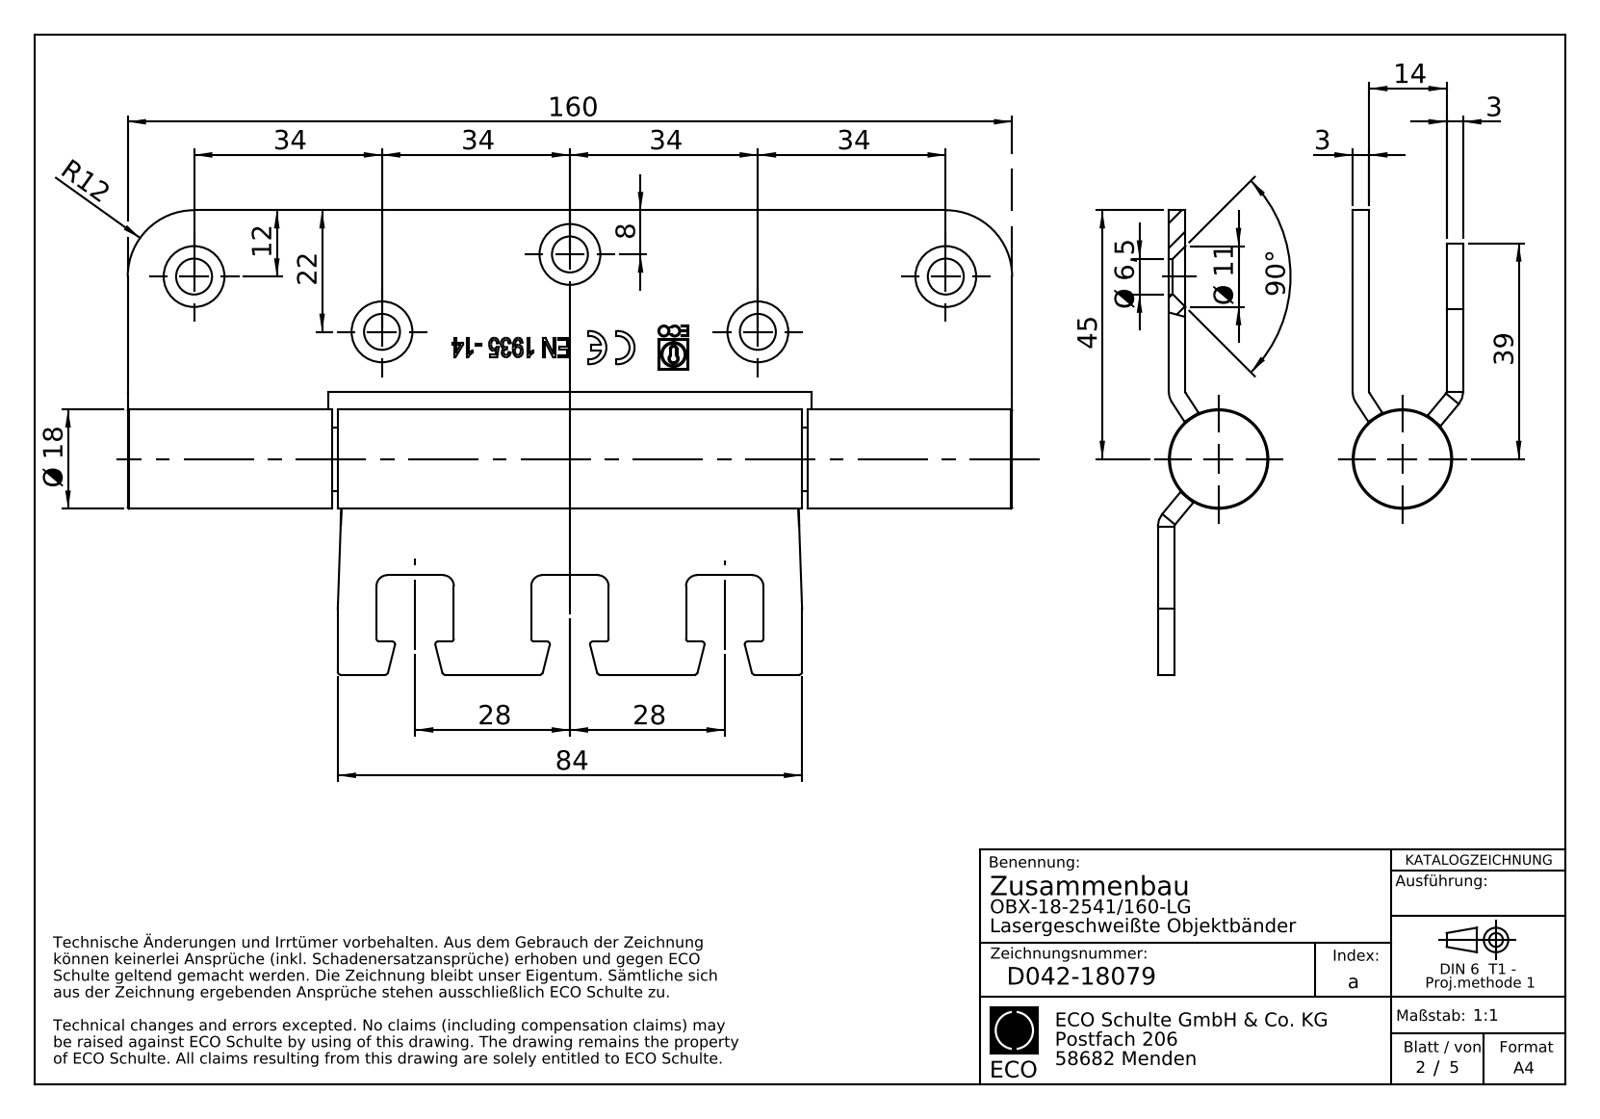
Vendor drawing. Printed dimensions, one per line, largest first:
160
90°
84
45
39
34
34
34
34
28
28
22
Ø 18
14
R12
12
Ø 11
8
Ø 6,5
3
3
